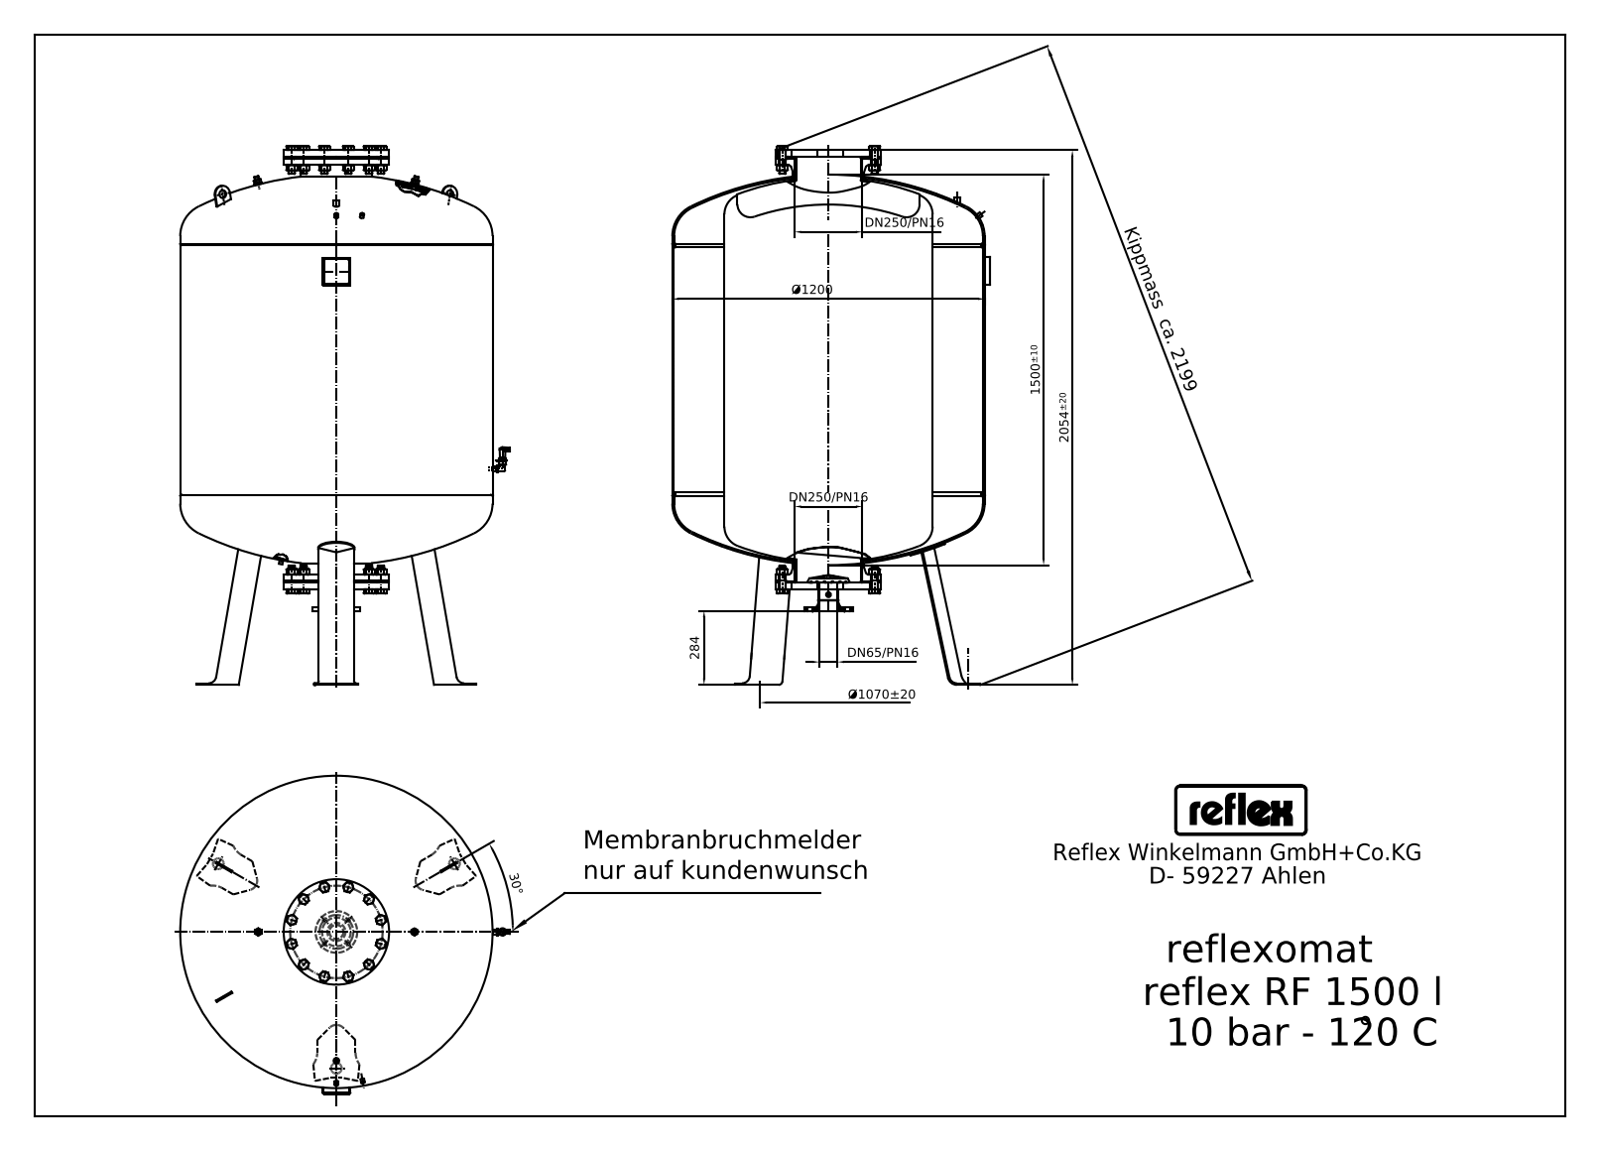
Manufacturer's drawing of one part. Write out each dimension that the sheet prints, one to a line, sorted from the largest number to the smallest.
Kippmass ca. 2199
2054±20
1500±10
Ø1200
Ø1070±20
284
DN250/PN16
DN250/PN16
DN65/PN16
30°
